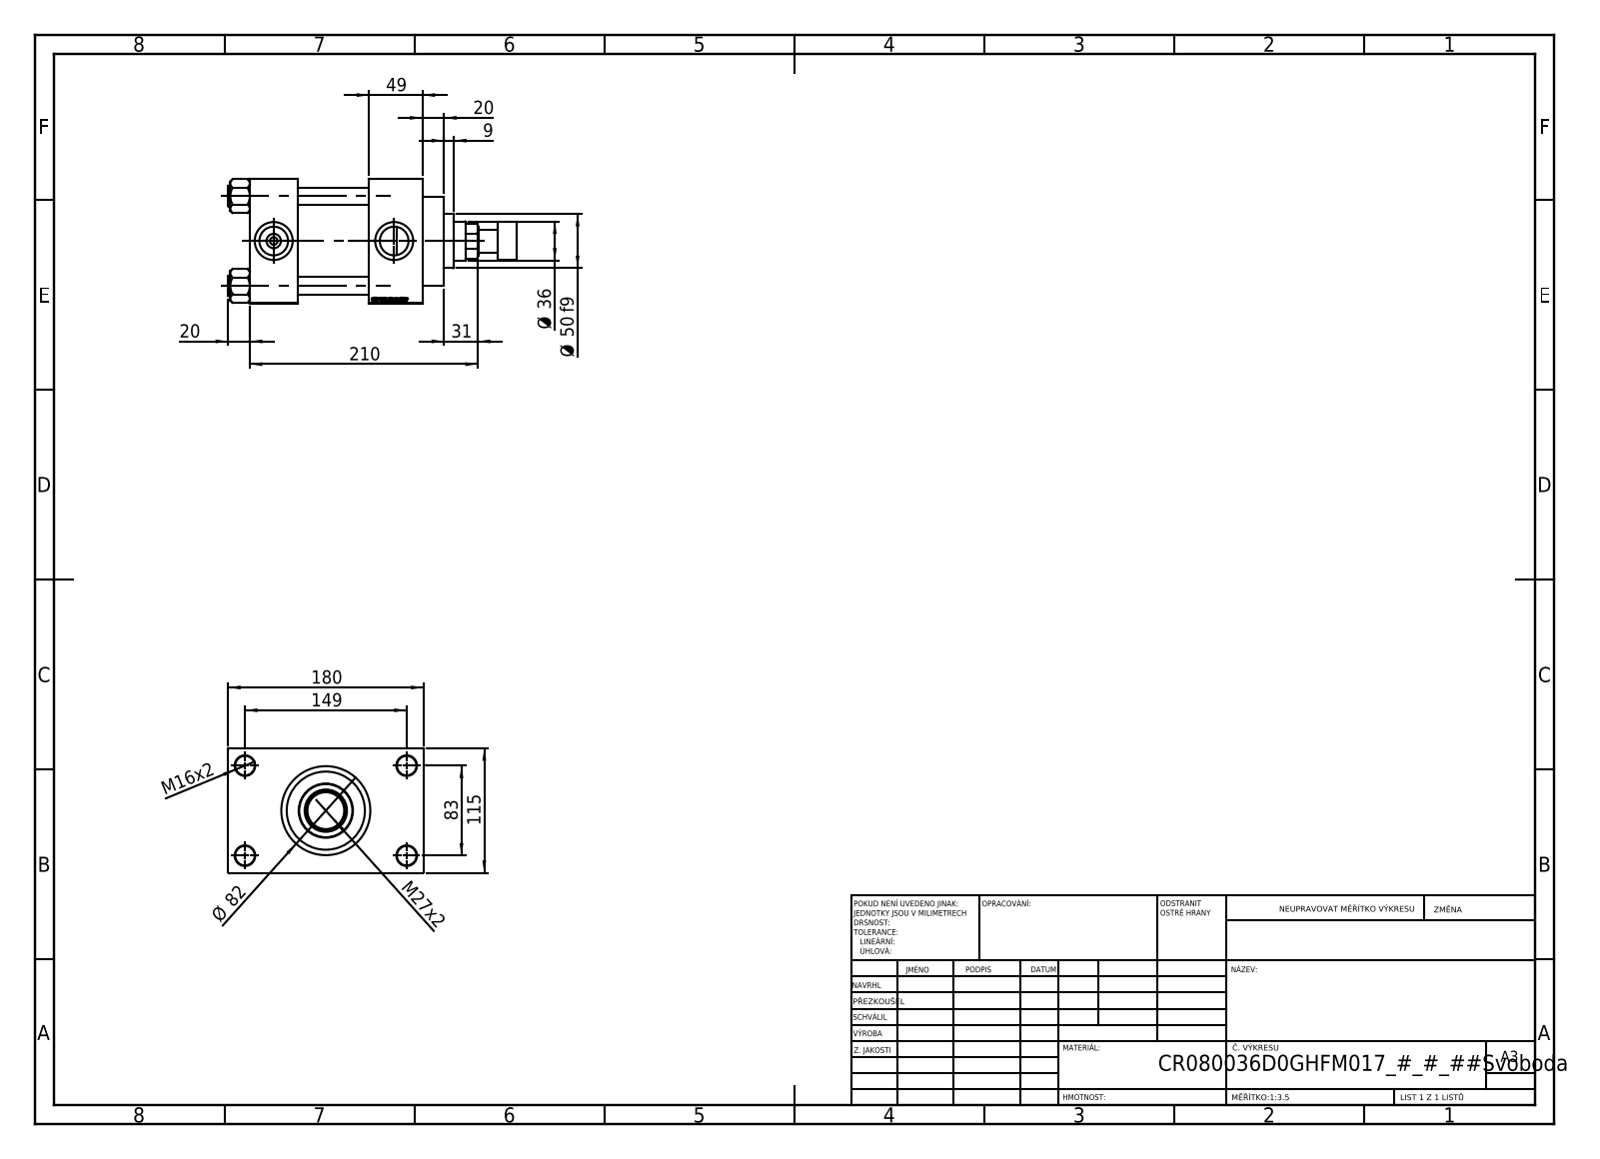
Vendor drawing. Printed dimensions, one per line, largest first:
210
180
149
115
83
Ø 82
Ø 50 f9
49
Ø 36
31
M27x2
20
20
M16x2
9
